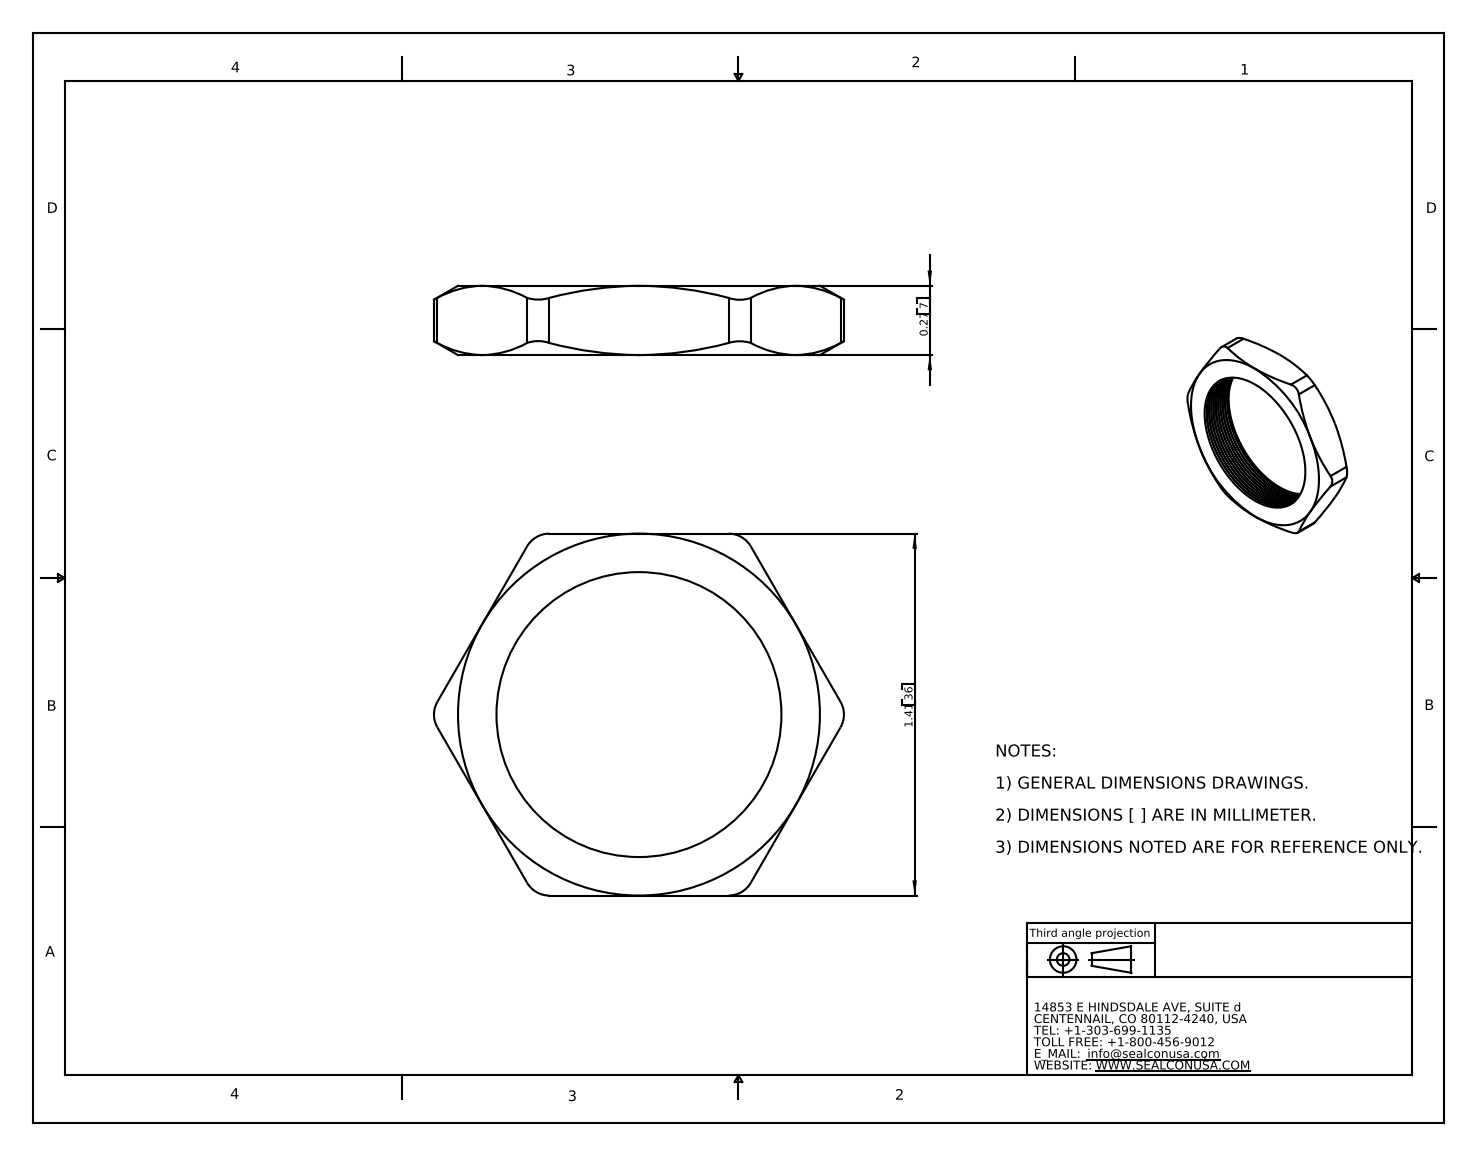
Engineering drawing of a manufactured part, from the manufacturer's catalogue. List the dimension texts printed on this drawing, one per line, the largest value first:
1.41 36
0.27 7
